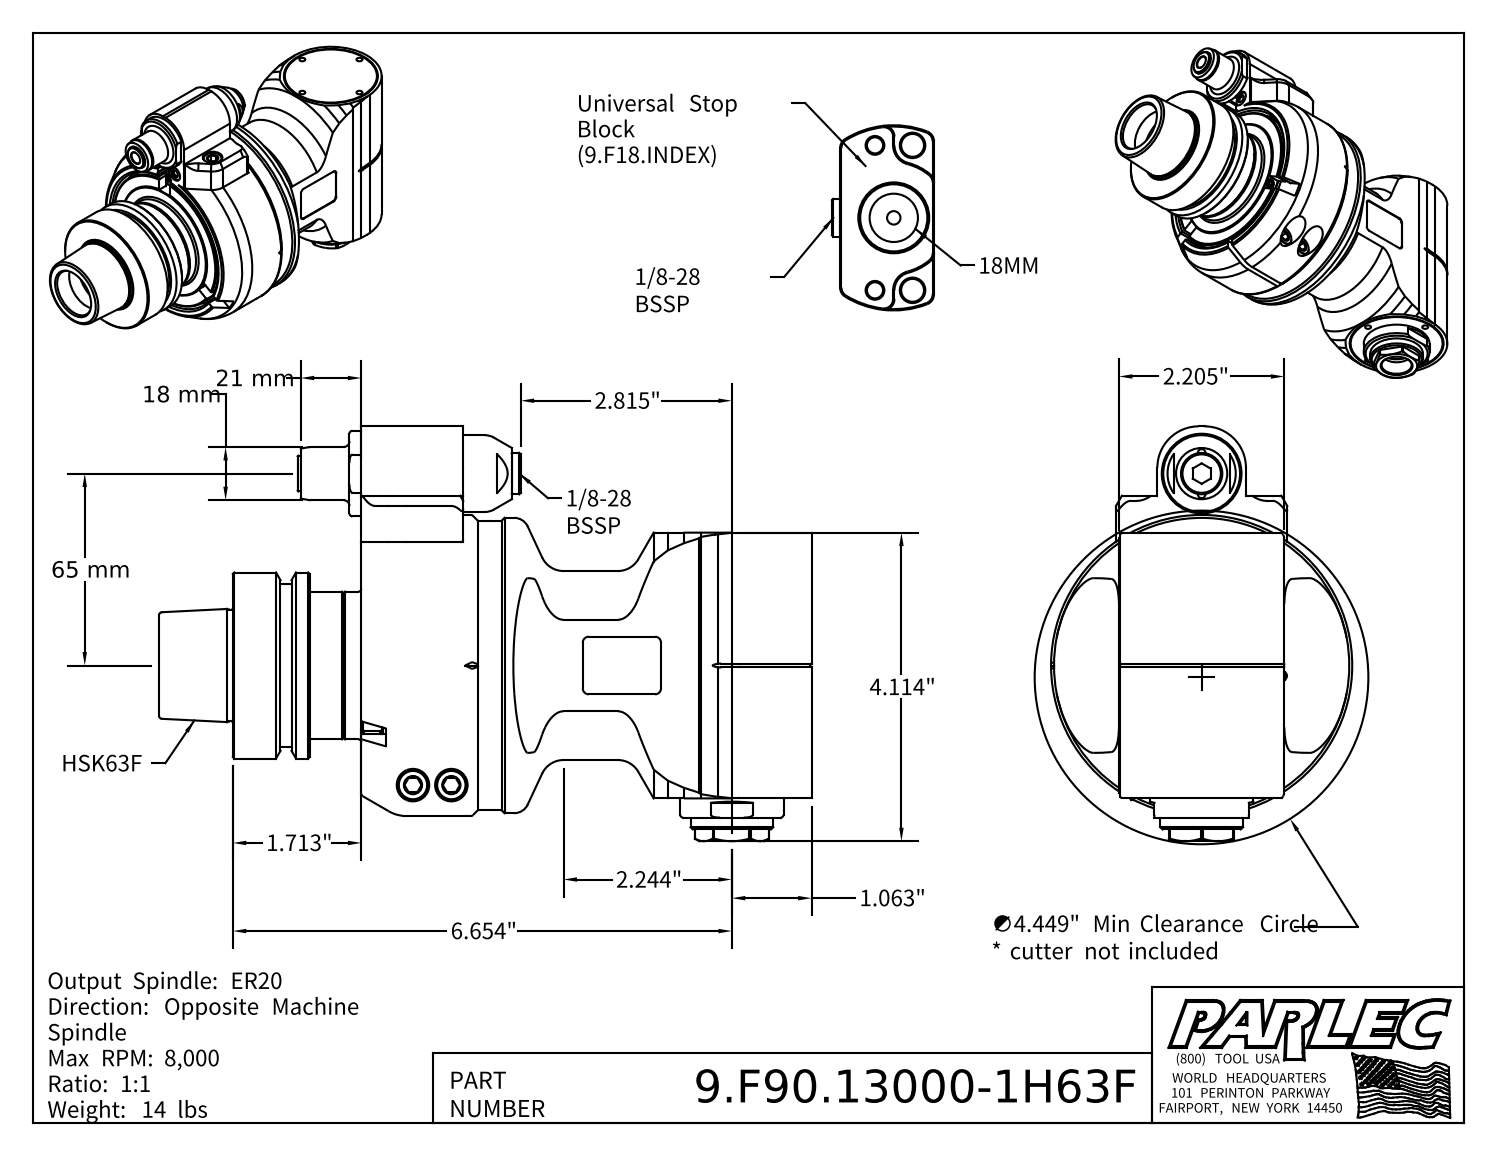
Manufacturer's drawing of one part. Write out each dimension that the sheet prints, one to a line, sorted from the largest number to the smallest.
65 mm
21 mm
18 mm
6.654"
∅4.449" Min Clearance Circle * cutter not included
4.114"
2.815"
2.244"
2.205"
1.713"
1.063"
